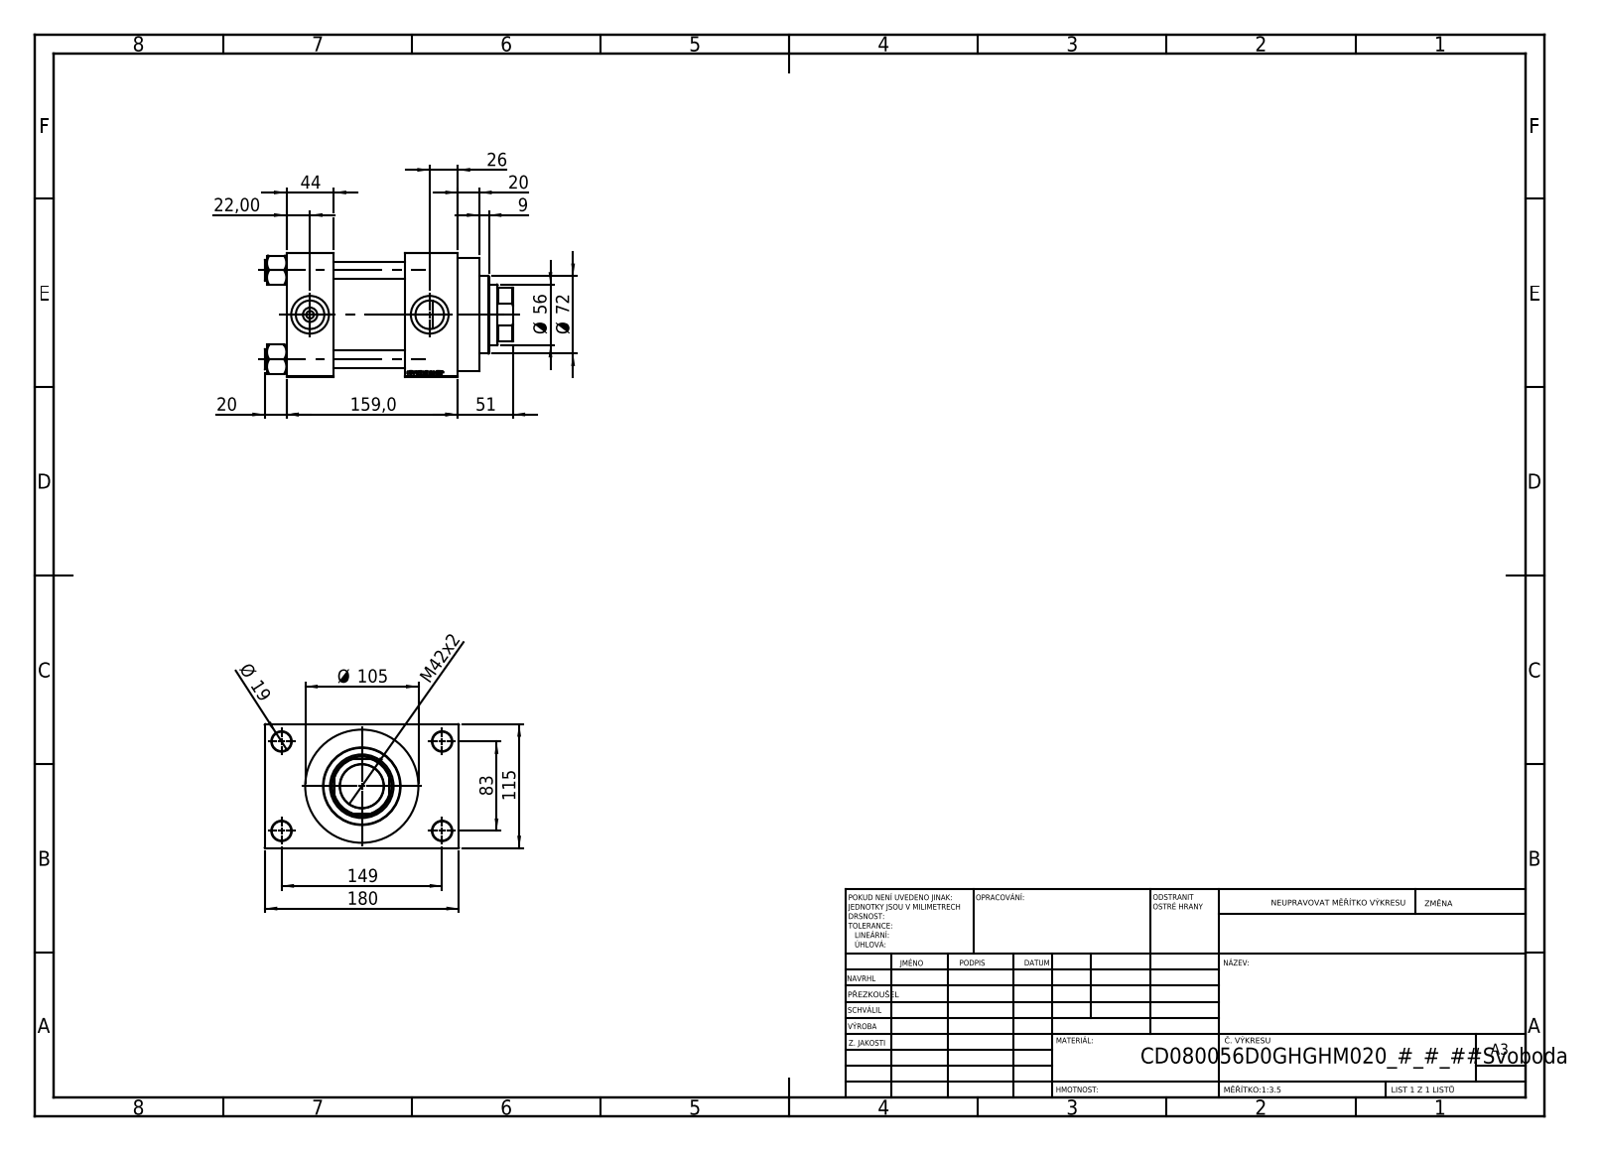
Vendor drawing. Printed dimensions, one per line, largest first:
180
159,0
149
115
Ø 105
83
Ø 72
Ø 56
51
44
M42x2
26
22,00
20
20
Ø 19
9
